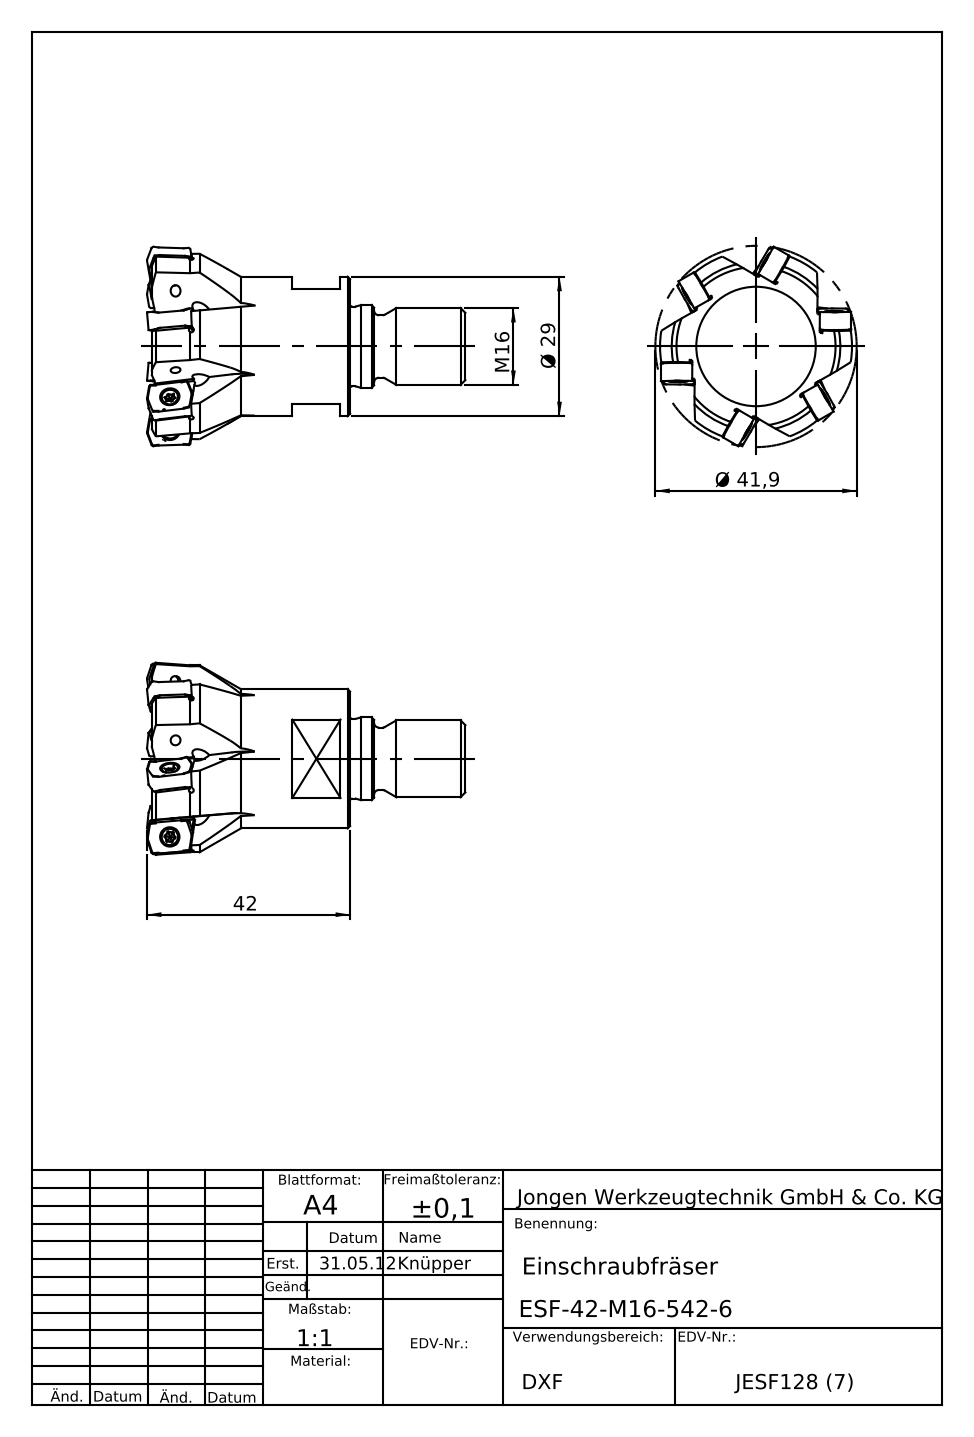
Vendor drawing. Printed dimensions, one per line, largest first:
42
Ø 41,9
Ø 29
M 16
